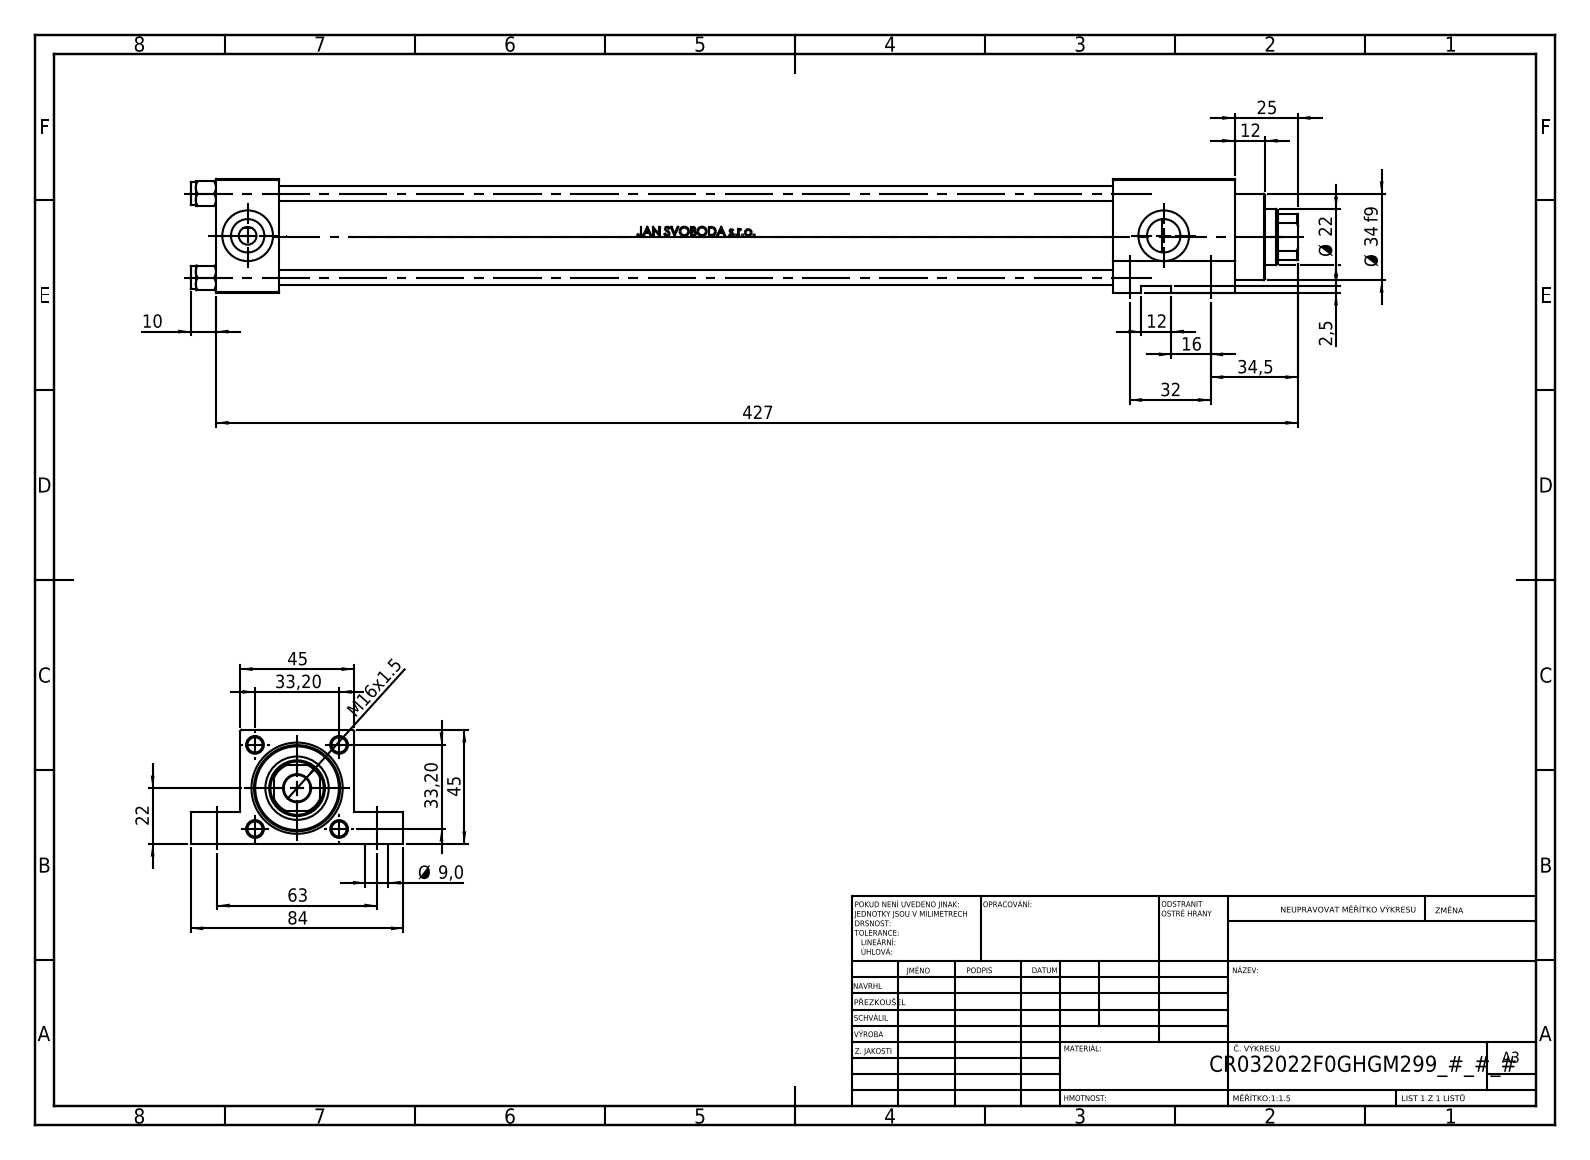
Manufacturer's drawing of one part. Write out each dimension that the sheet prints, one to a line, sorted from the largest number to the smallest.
427
84
63
45
45
34,5
Ø 34 f9
33,20
33,20
32
25
Ø 22
22
16
M16x1.5
12
12
10
Ø 9,0
2,5
